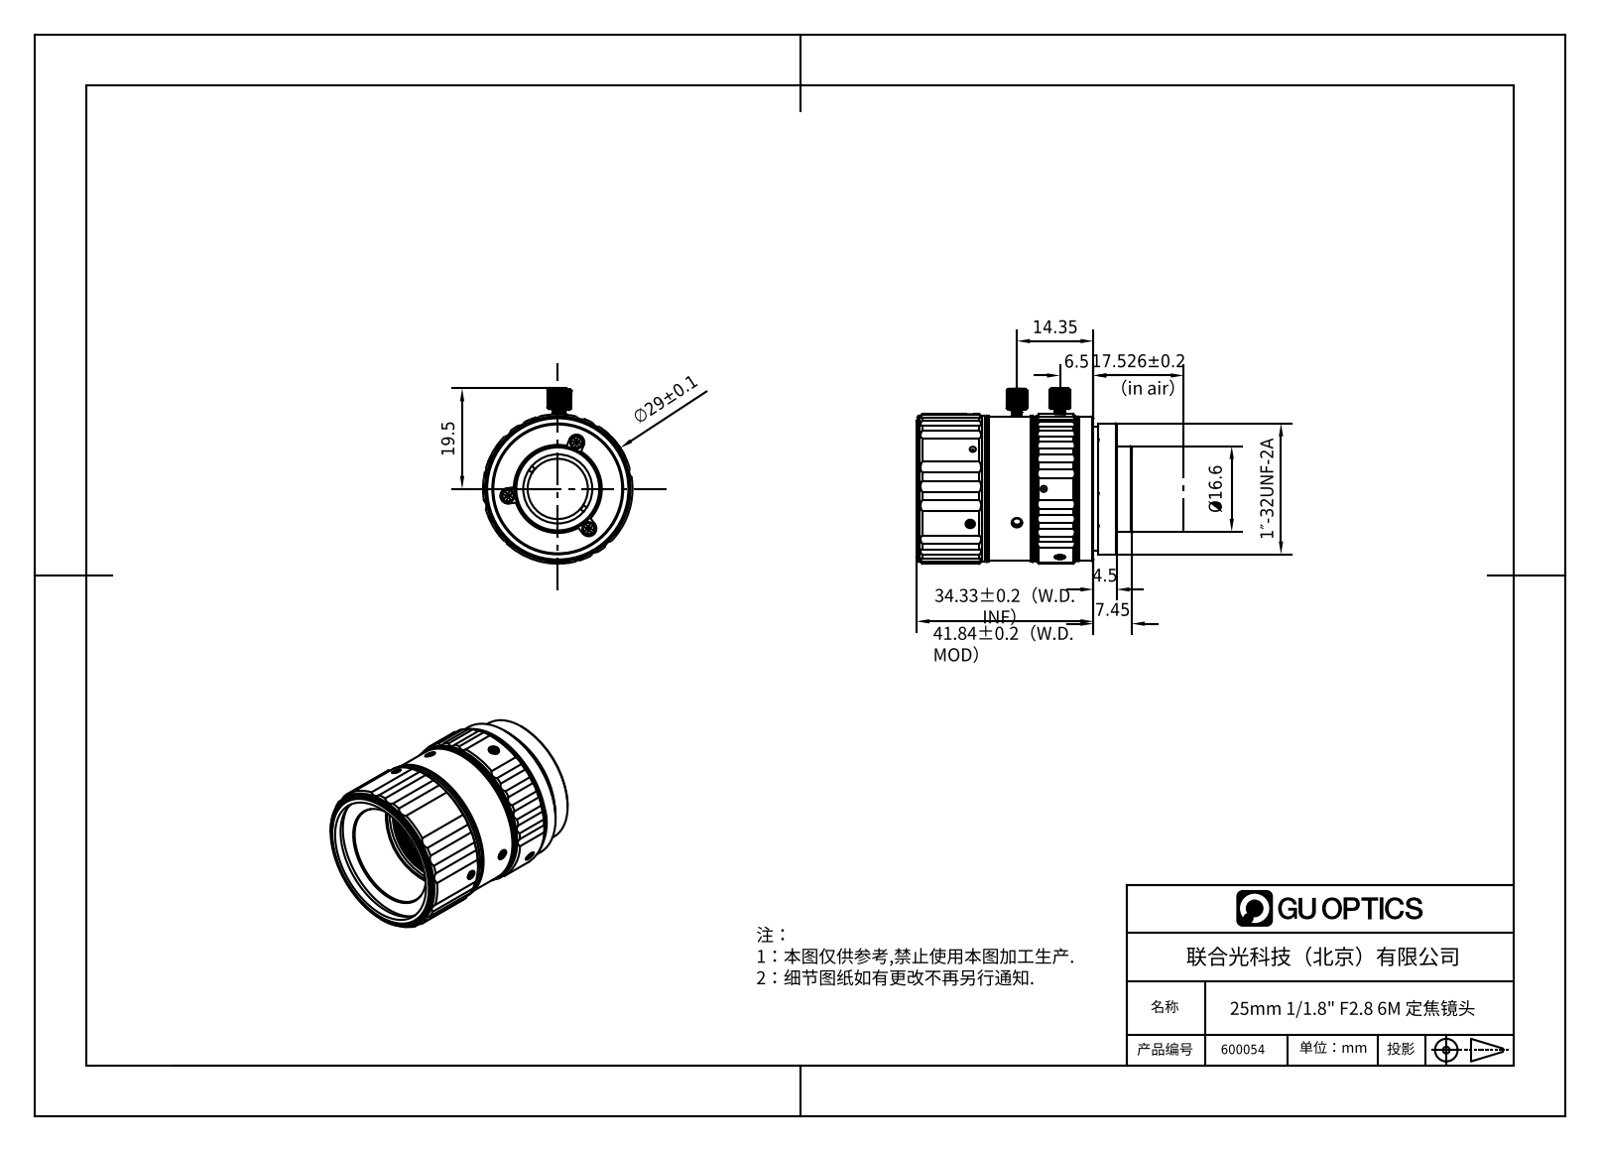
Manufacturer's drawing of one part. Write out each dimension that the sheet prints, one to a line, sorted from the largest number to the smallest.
34.33±0.2（W.D. INF）
19.5
17.526±0.2
Ø16.6
14.35
7.45
6.5
4.5
1″-32UNF-2A
±0.1
